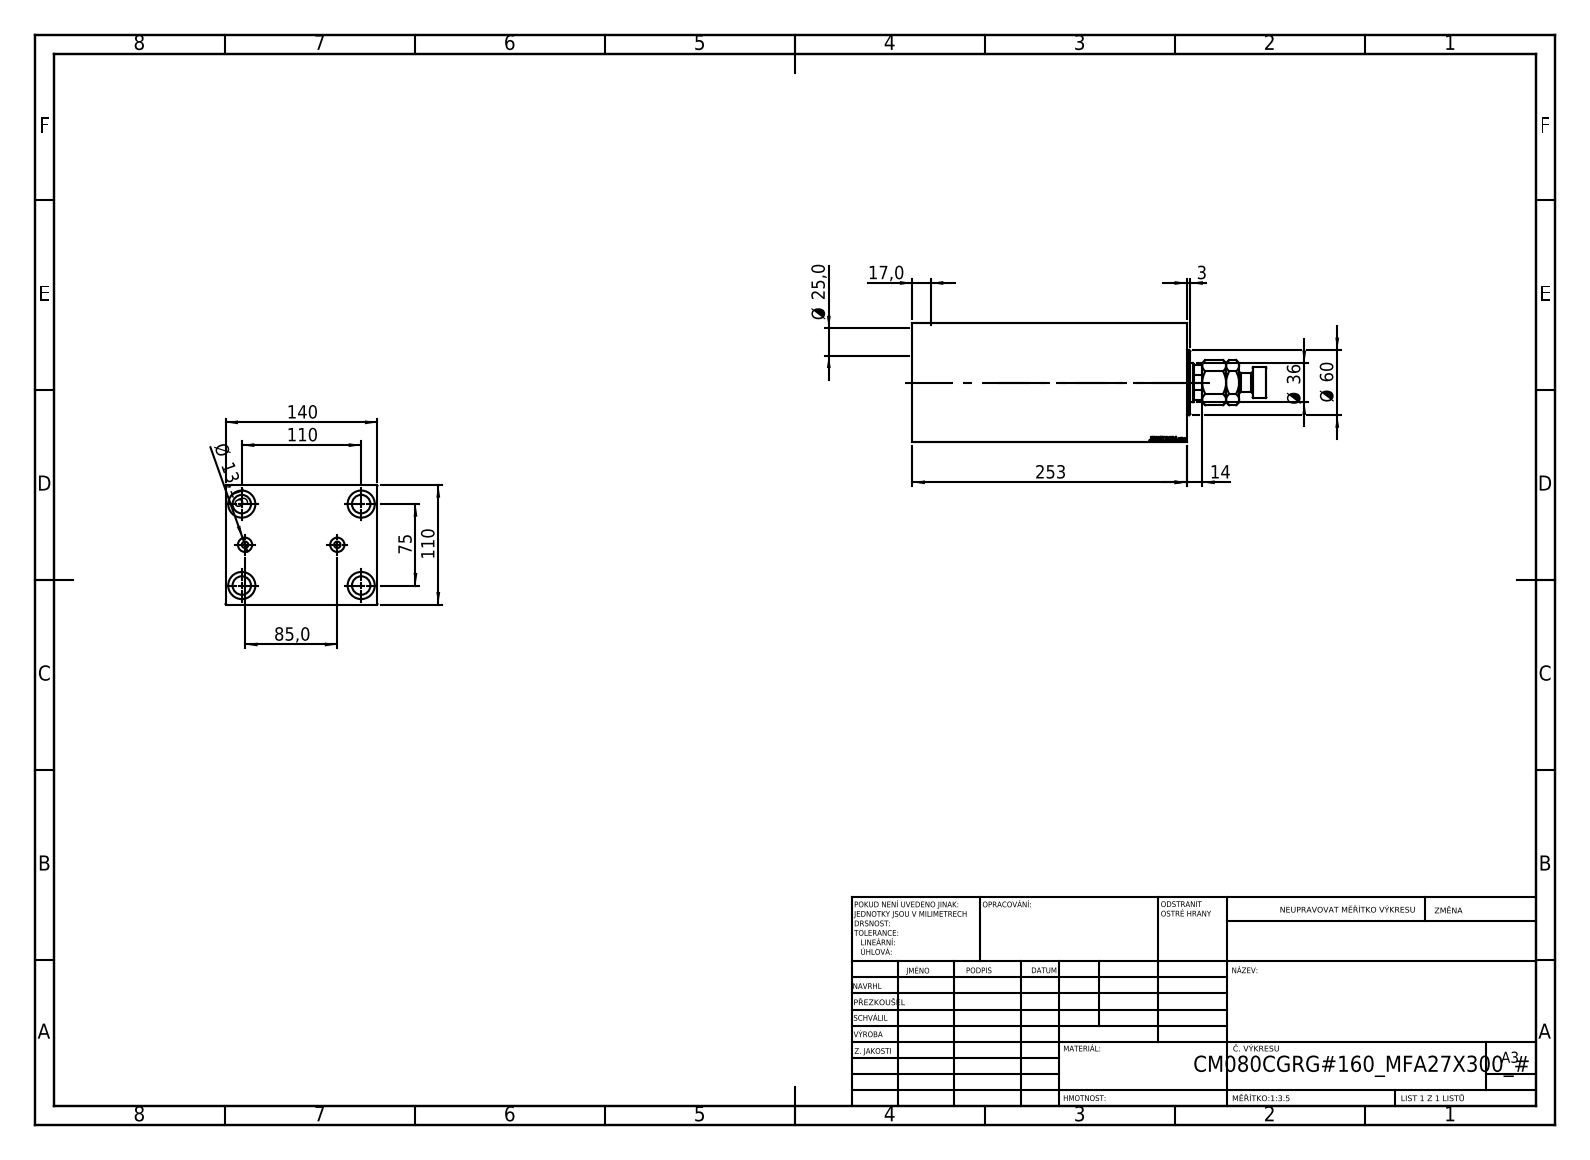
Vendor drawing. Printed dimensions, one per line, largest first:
253
140
110
110
85,0
75
Ø 60
Ø 36
Ø 25,0
17,0
14
Ø 13,16
3
